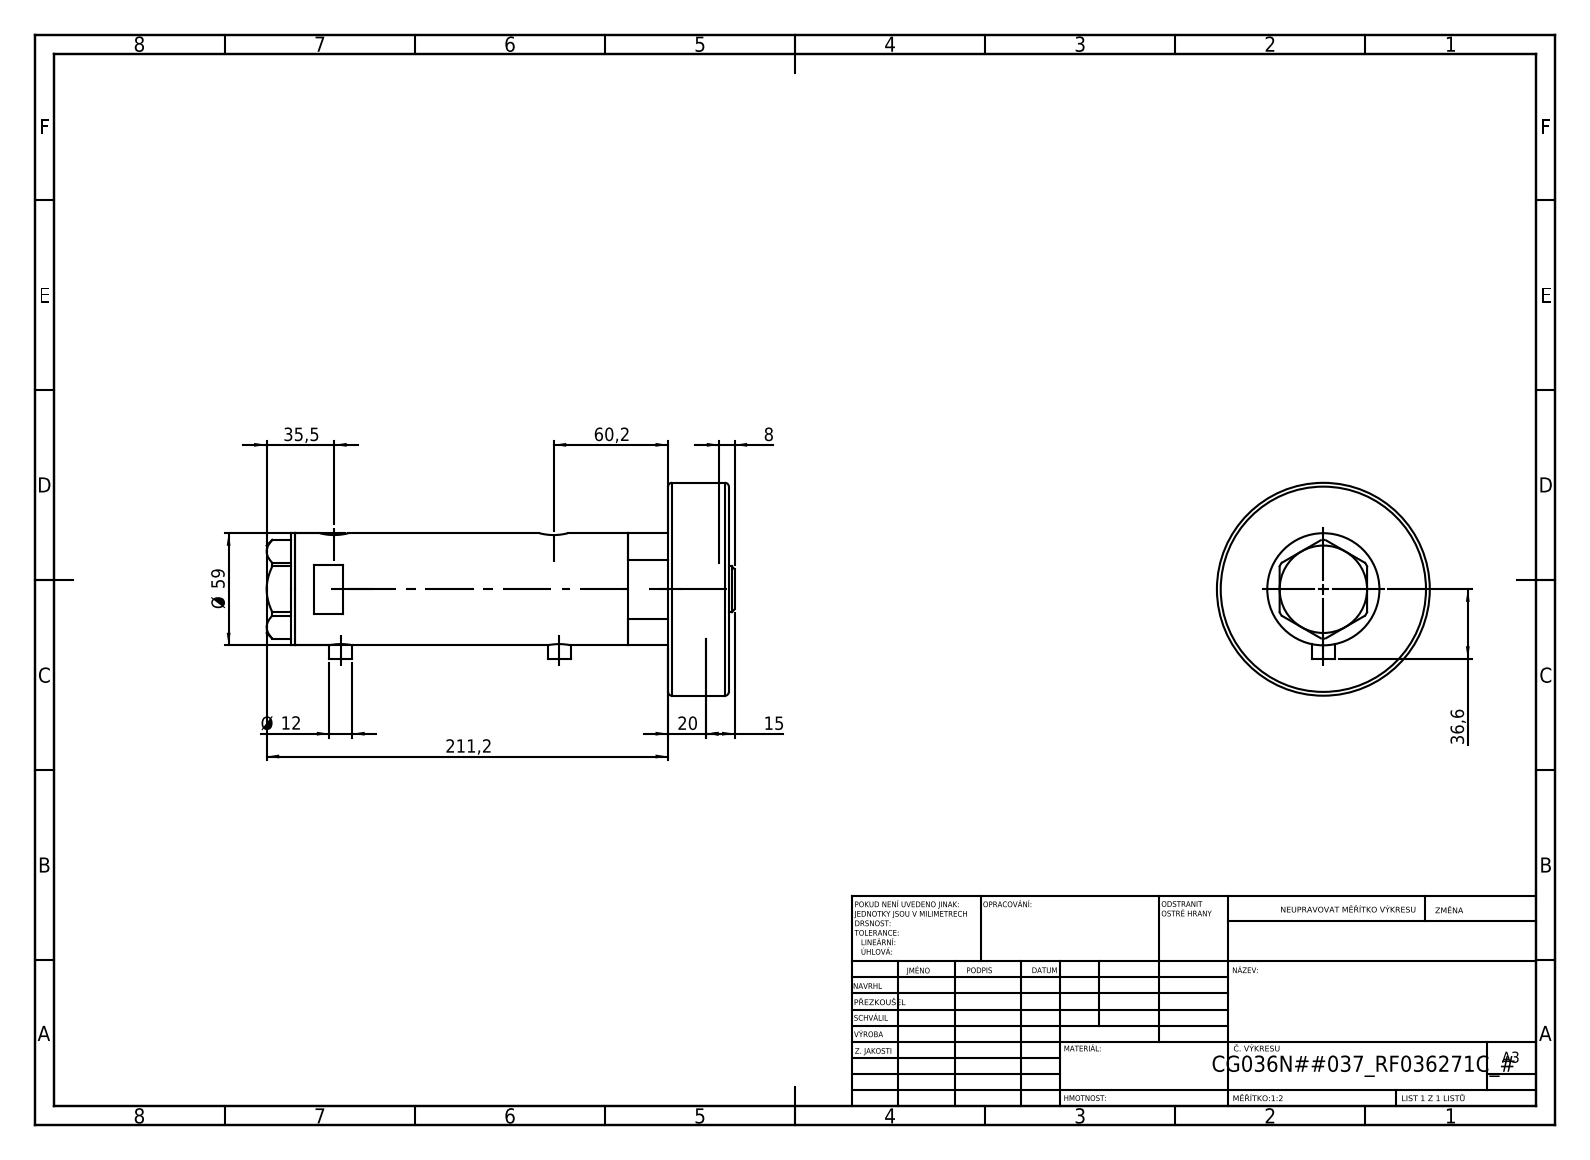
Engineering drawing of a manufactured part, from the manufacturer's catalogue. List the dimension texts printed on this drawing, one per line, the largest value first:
211,2
60,2
Ø 59
36,6
35,5
20
15
Ø 12
8
